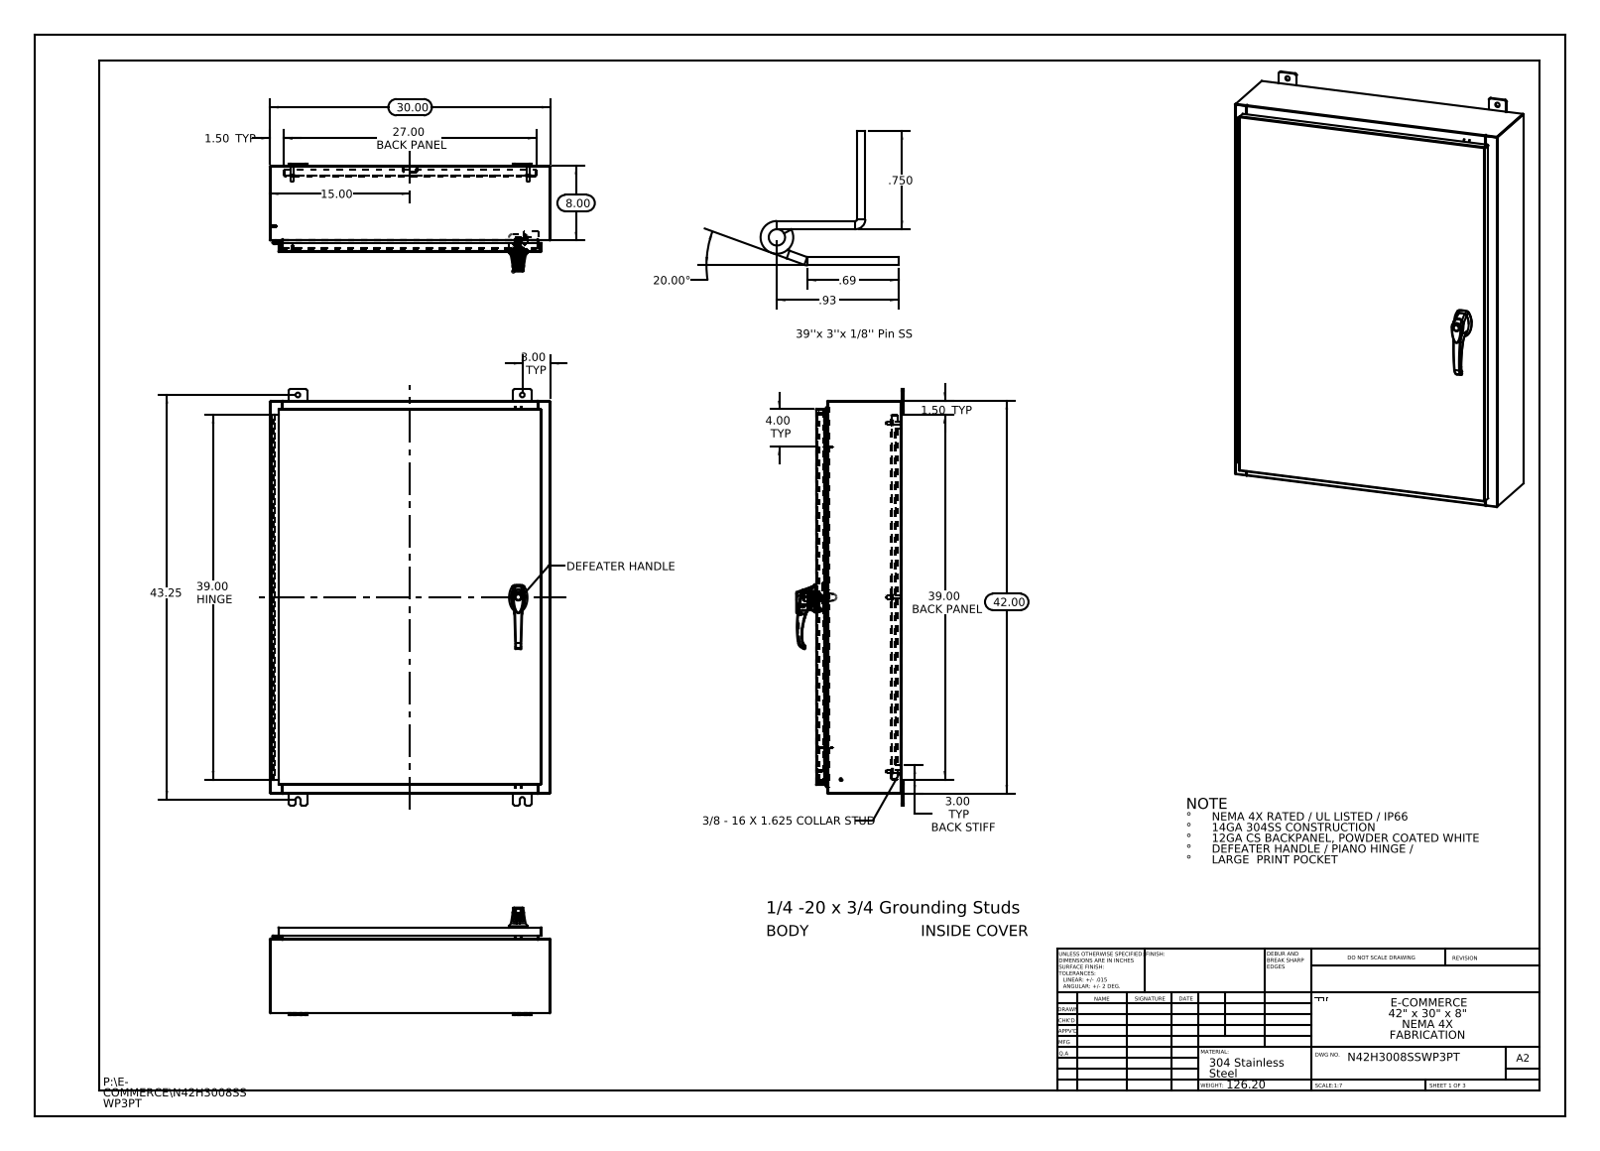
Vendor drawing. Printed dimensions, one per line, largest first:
43.25
42.00
39.00 HINGE
39.00 BACK PANEL
30.00
27.00 BACK PANEL
20.00°
15.00
8.00
4.00 TYP
3.00 TYP
3.00 TYP BACK STIFF
1.50 TYP
1.50 TYP
.93
.750
.69
